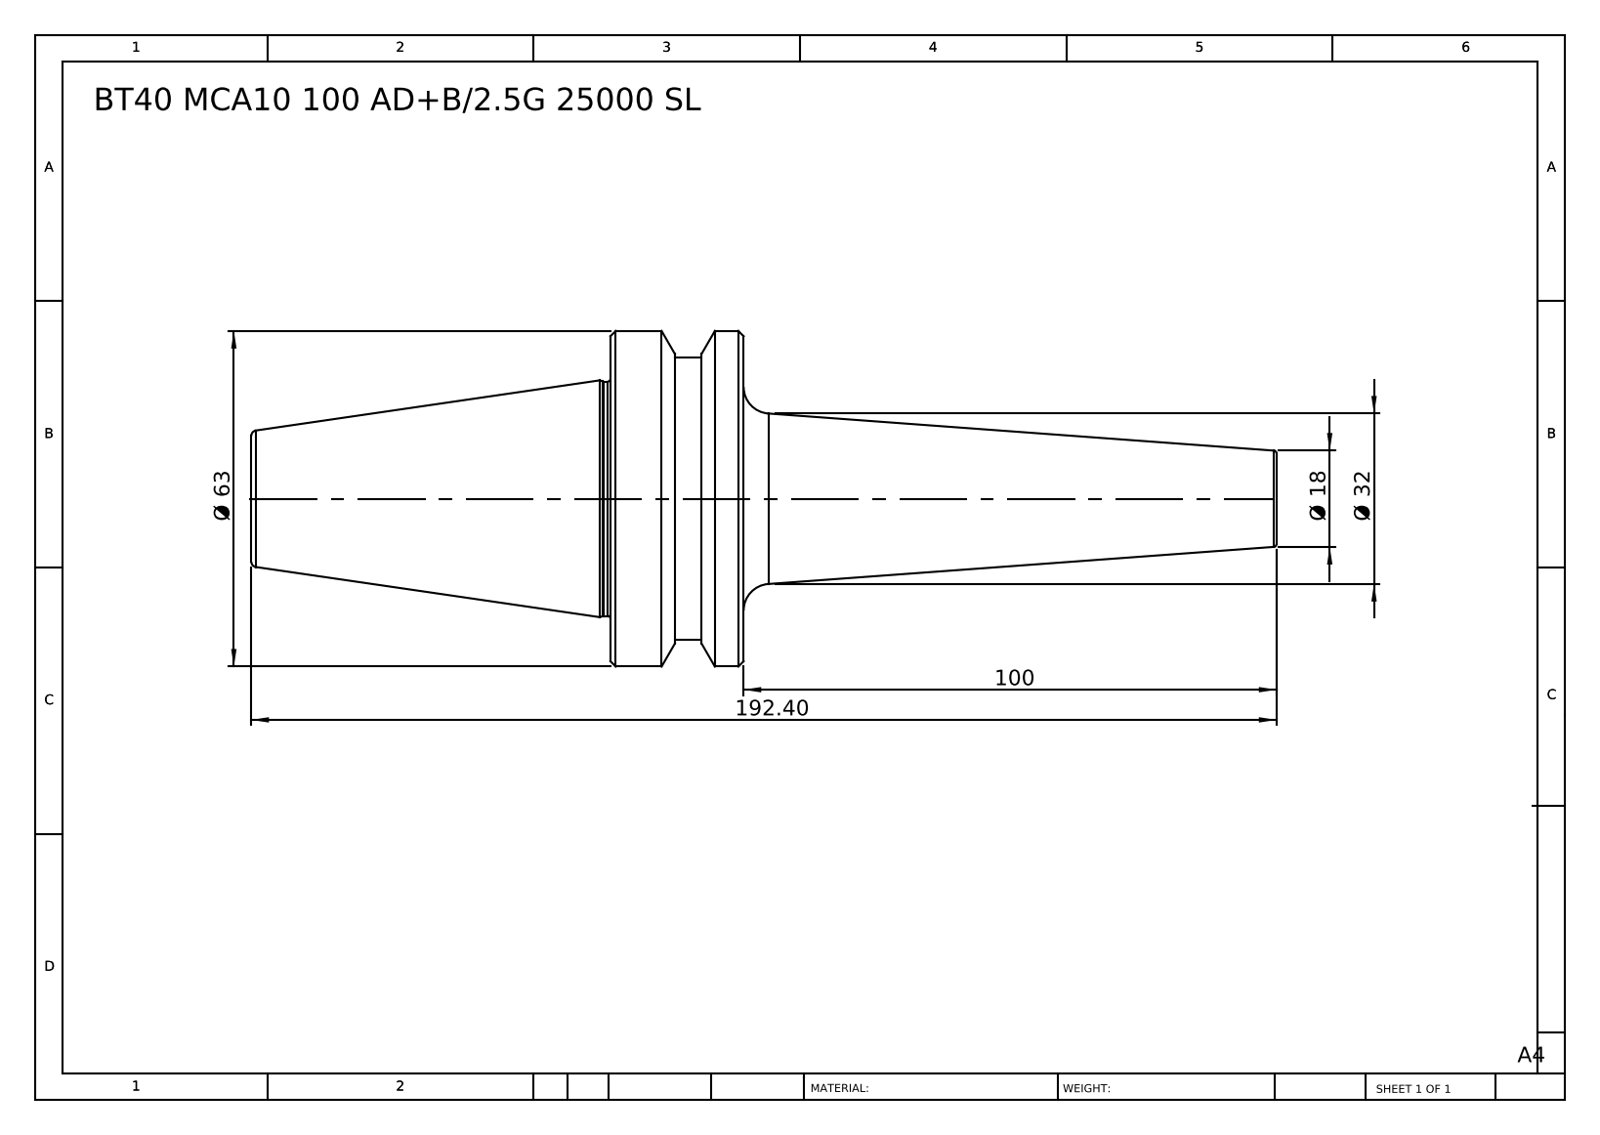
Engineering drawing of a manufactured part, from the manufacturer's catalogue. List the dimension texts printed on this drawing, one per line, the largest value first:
192.40
100
Ø 63
Ø 32
Ø 18
